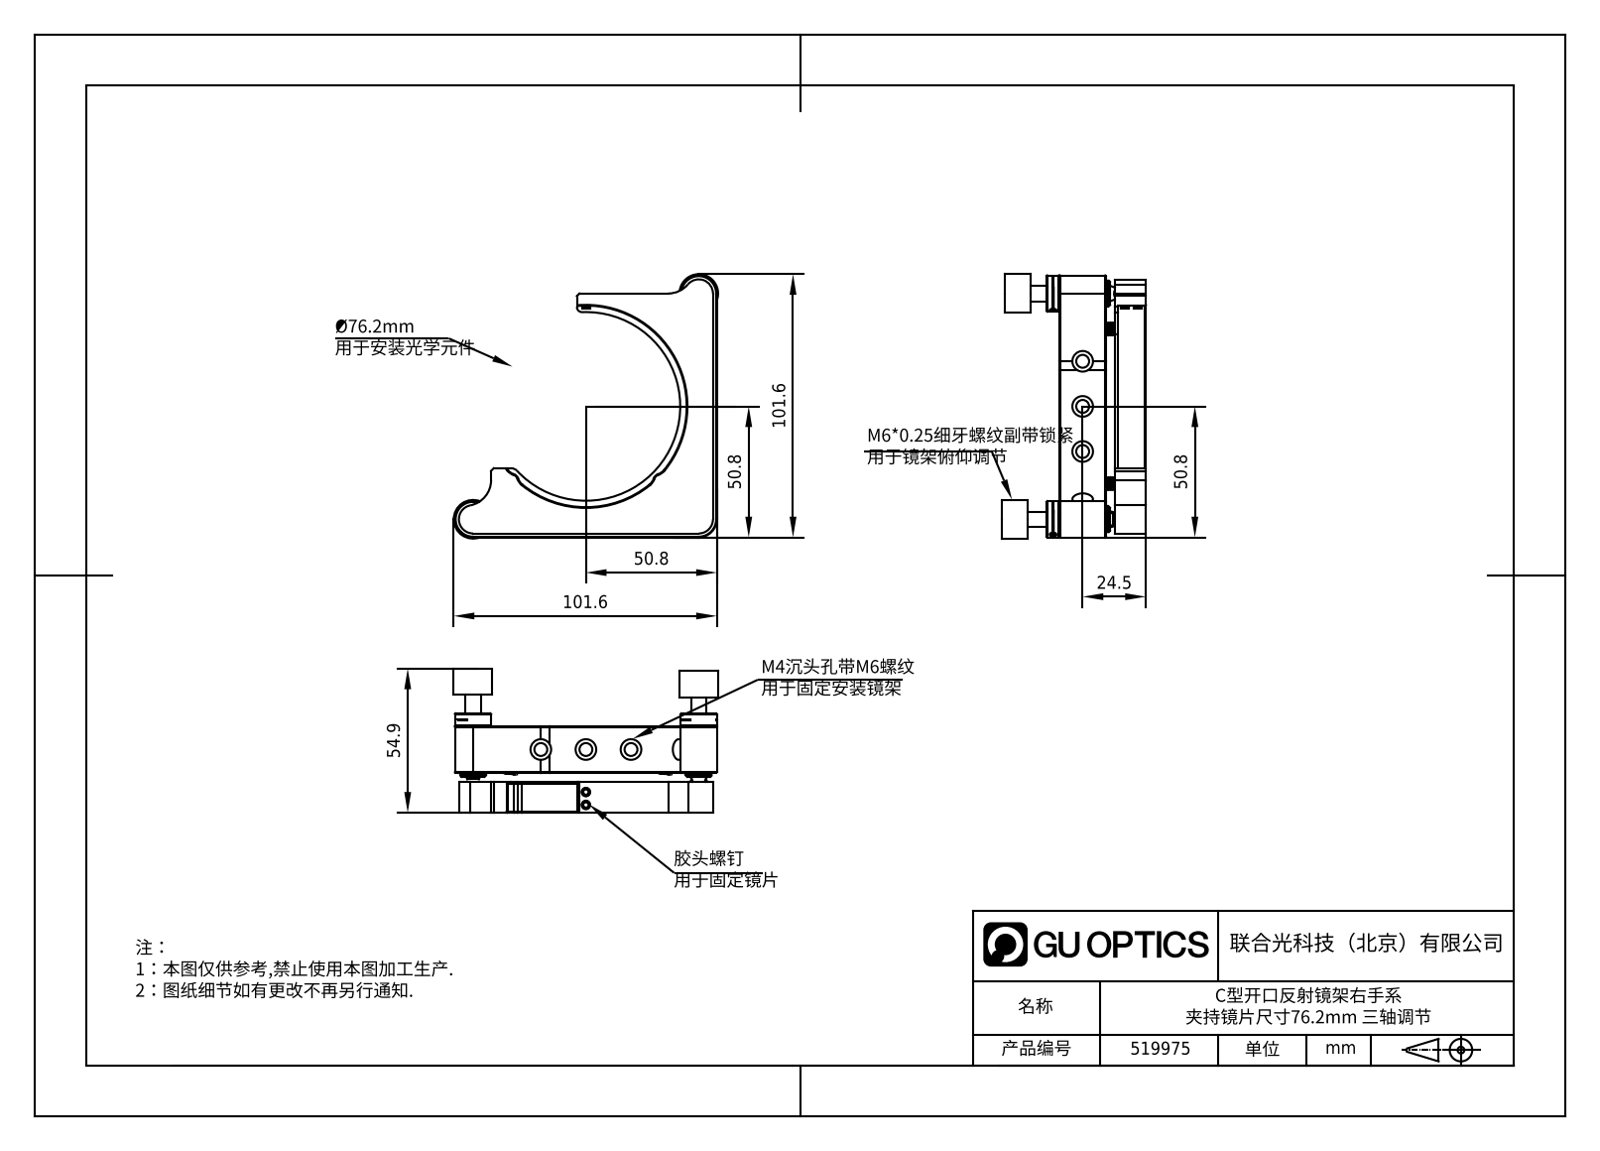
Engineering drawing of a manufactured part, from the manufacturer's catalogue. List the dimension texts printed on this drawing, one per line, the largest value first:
101.6
101.6
54.9
50.8
50.8
50.8
24.5
